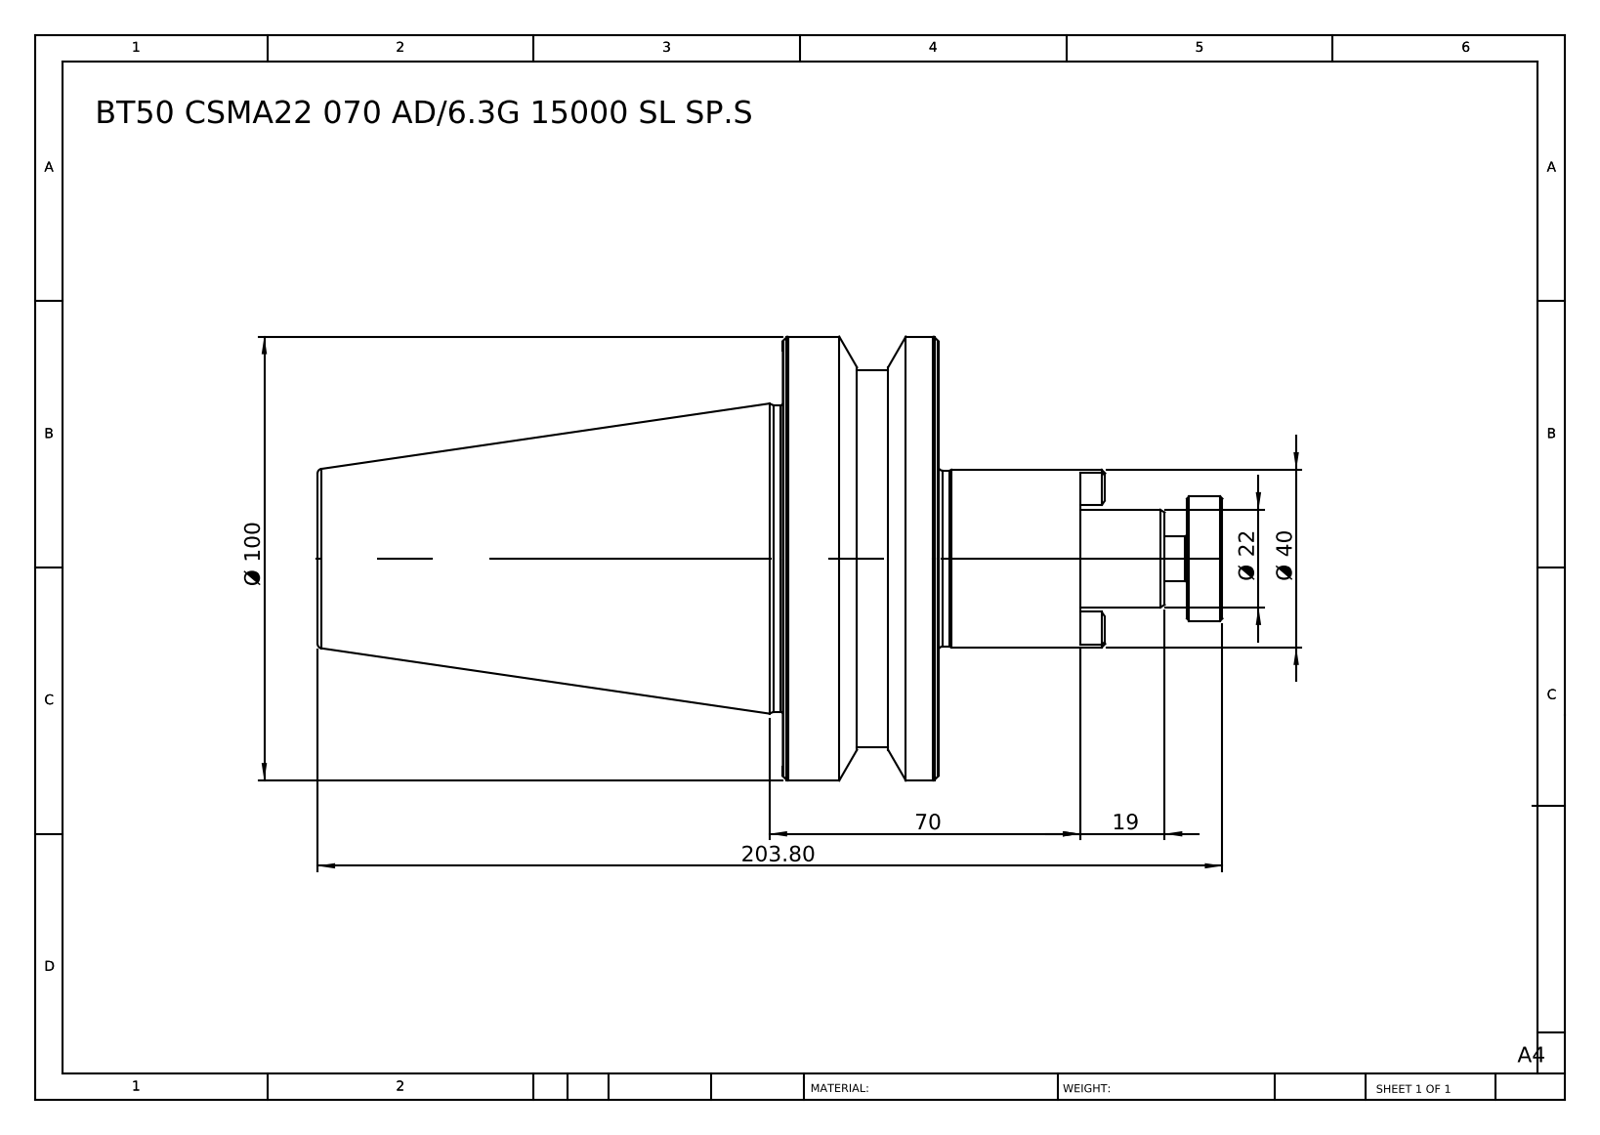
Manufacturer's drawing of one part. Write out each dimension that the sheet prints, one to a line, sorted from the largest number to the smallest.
203.80
Ø 100
70
Ø 40
Ø 22
19
